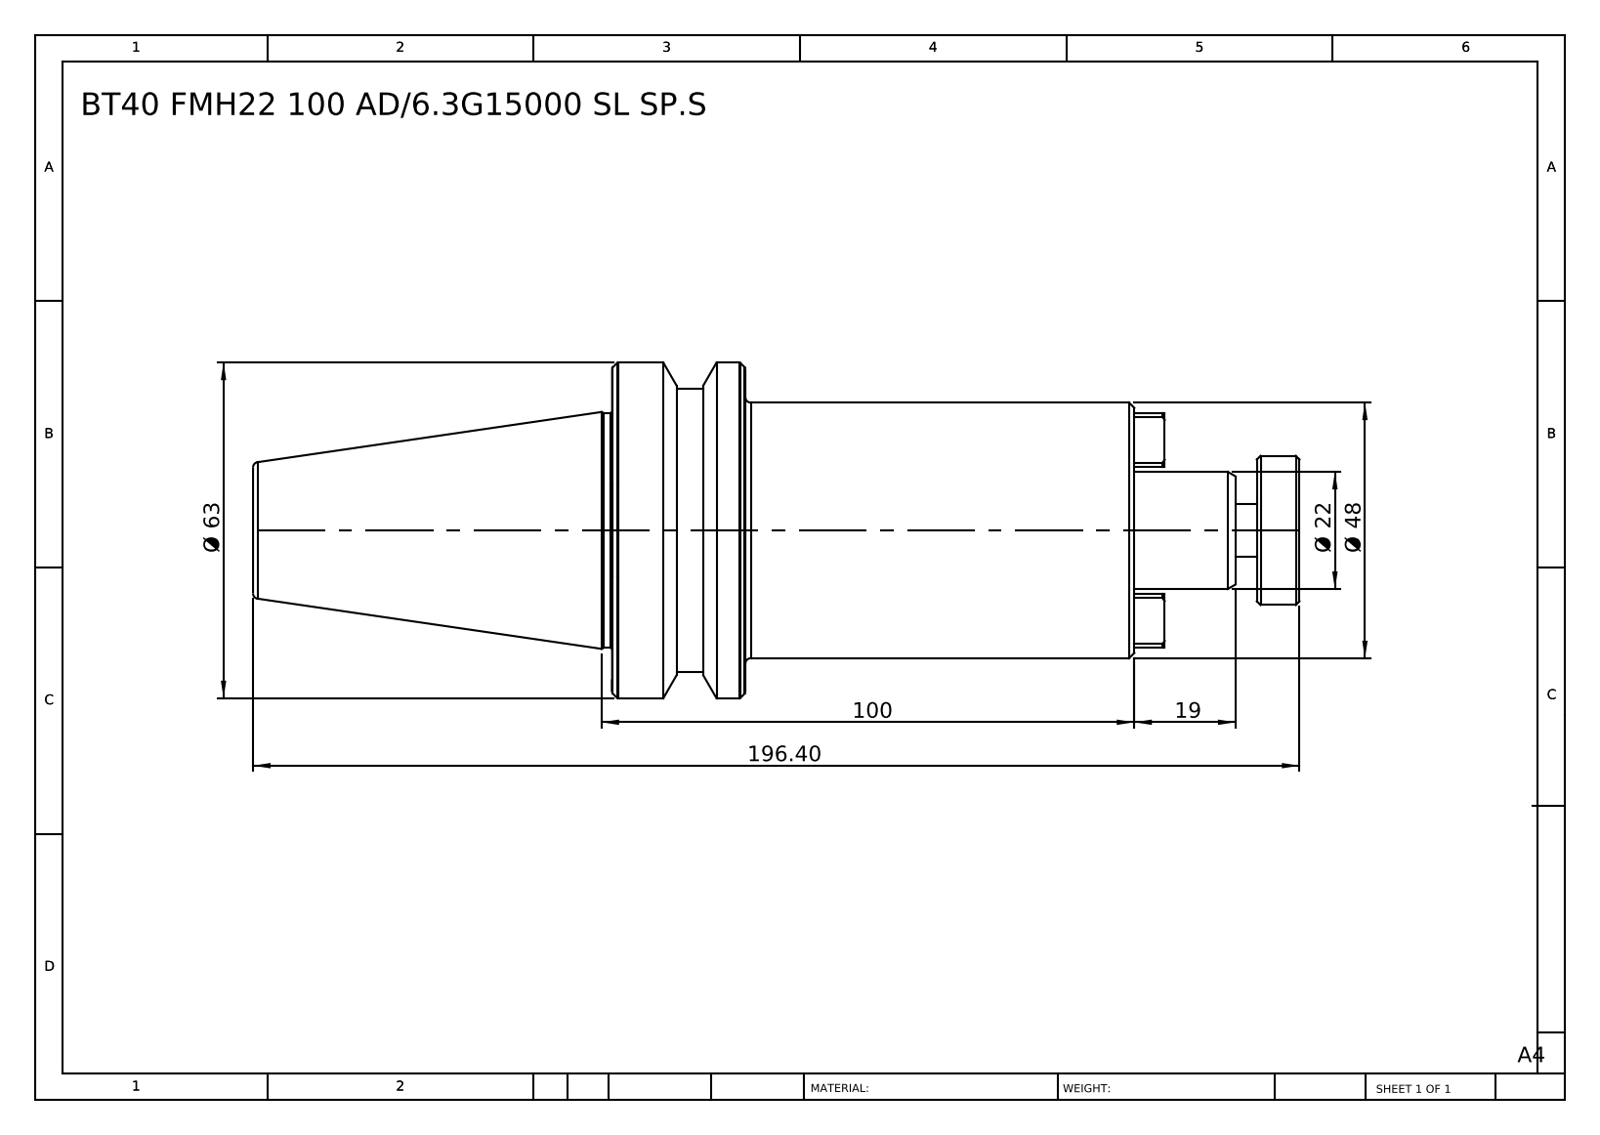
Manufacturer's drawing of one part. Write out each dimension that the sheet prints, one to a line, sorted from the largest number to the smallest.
196.40
100
Ø 63
Ø 48
Ø 22
19
